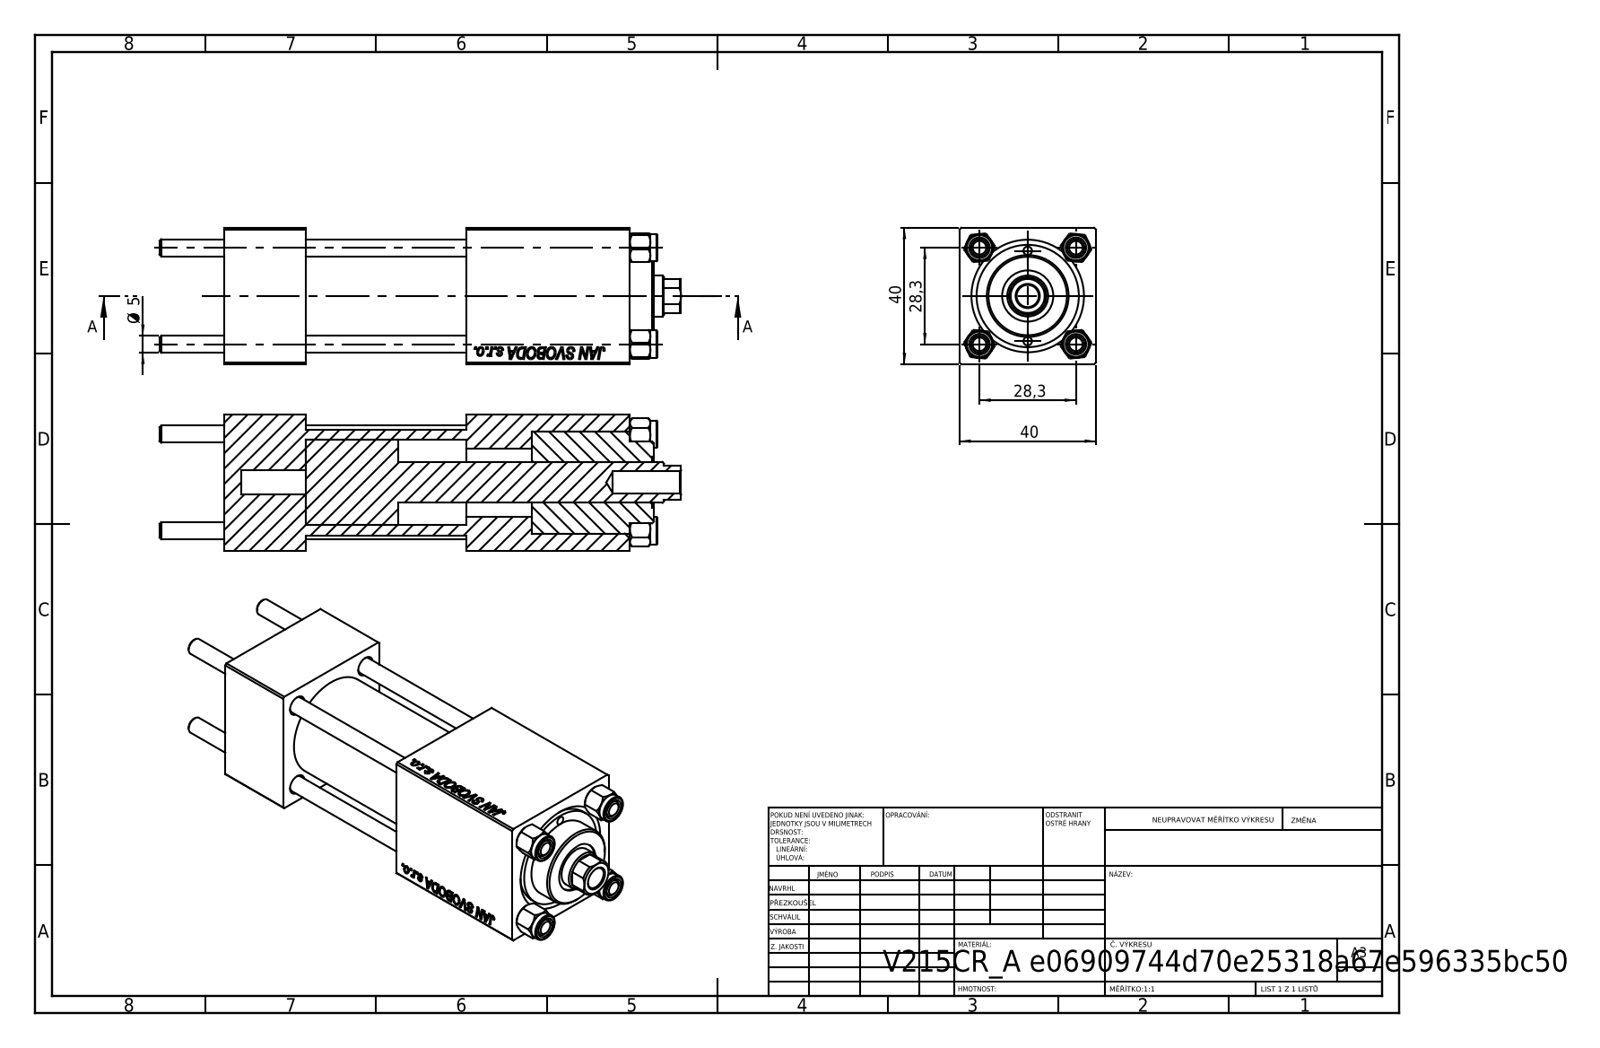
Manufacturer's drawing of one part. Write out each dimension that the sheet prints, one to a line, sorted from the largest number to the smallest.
40
40
28,3
28,3
Ø 5
